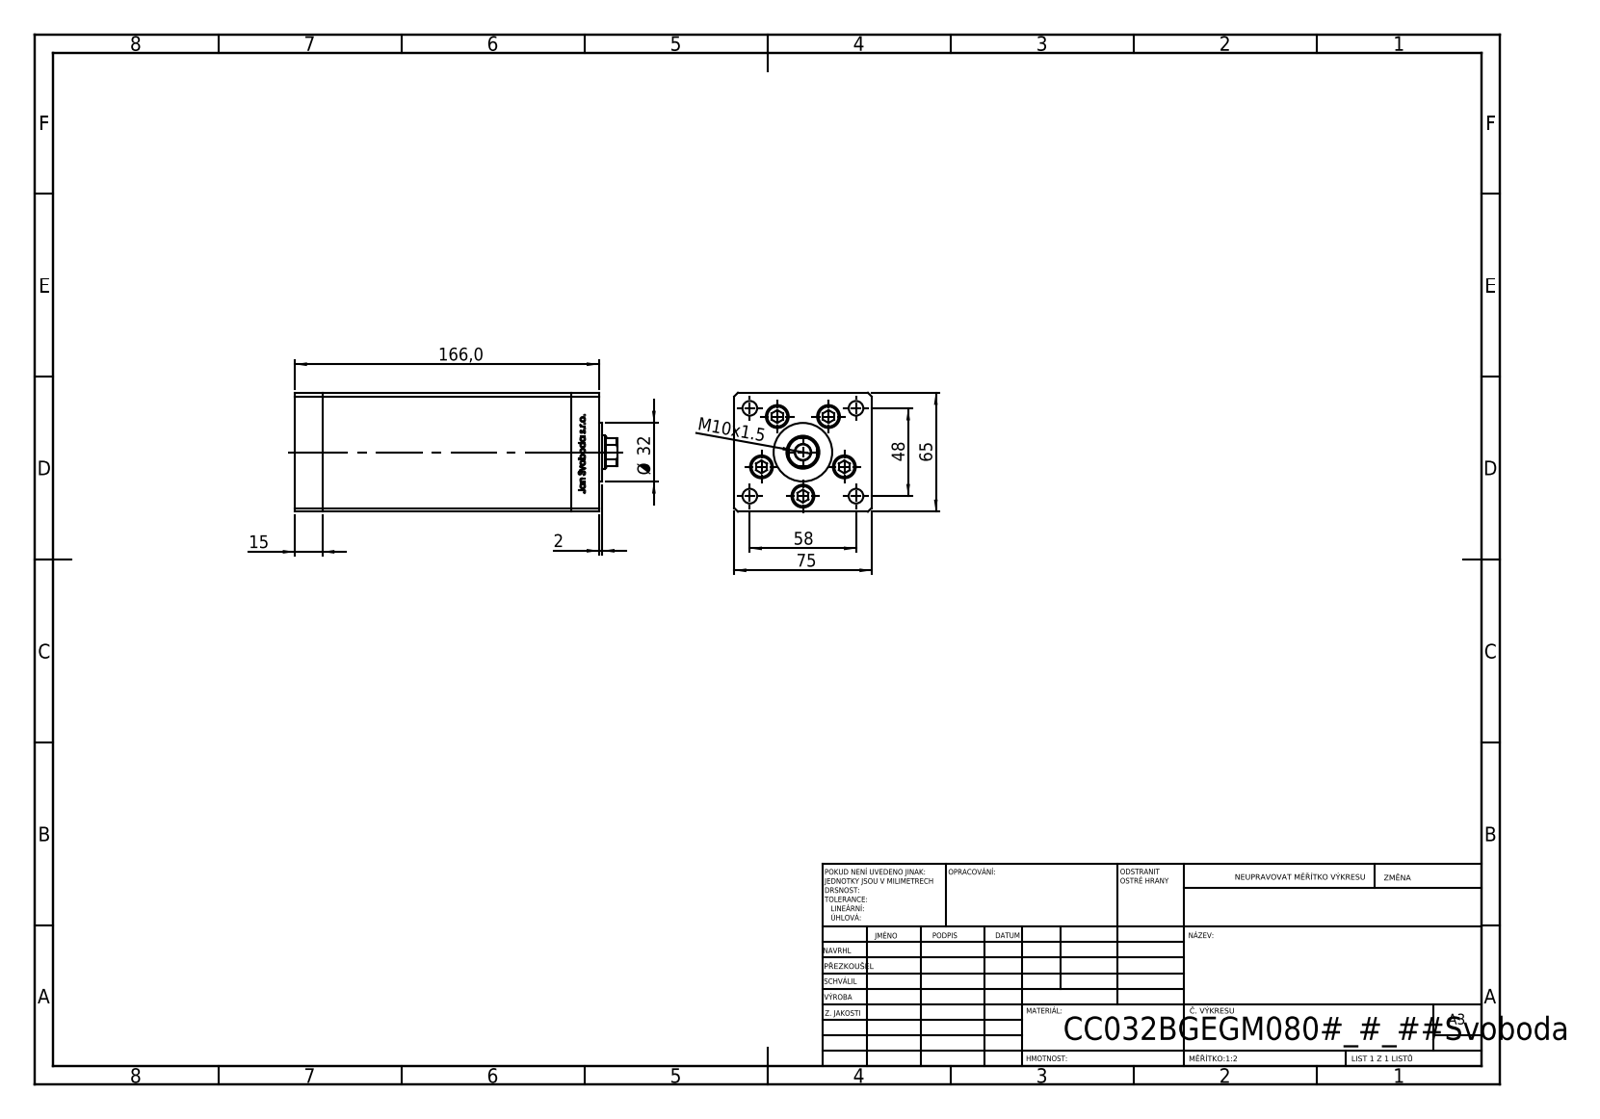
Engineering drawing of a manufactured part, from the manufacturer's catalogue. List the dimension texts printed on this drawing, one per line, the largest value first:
166,0
75
65
58
48
Ø 32
15
M10x1.5
2
